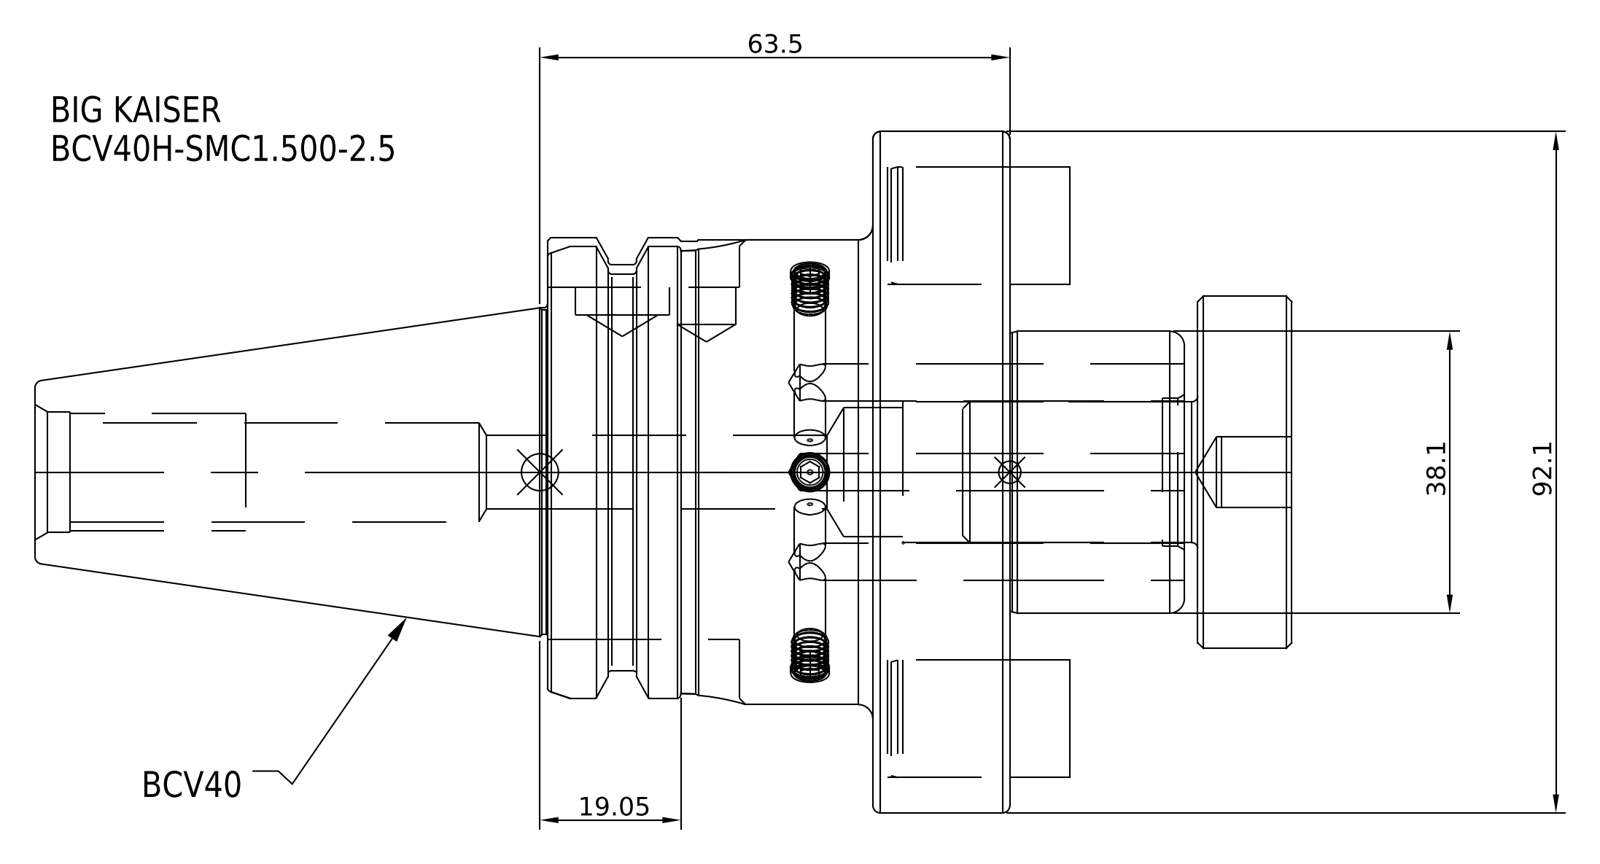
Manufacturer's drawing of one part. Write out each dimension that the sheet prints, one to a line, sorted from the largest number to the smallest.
92.1
63.5
38.1
19.05
